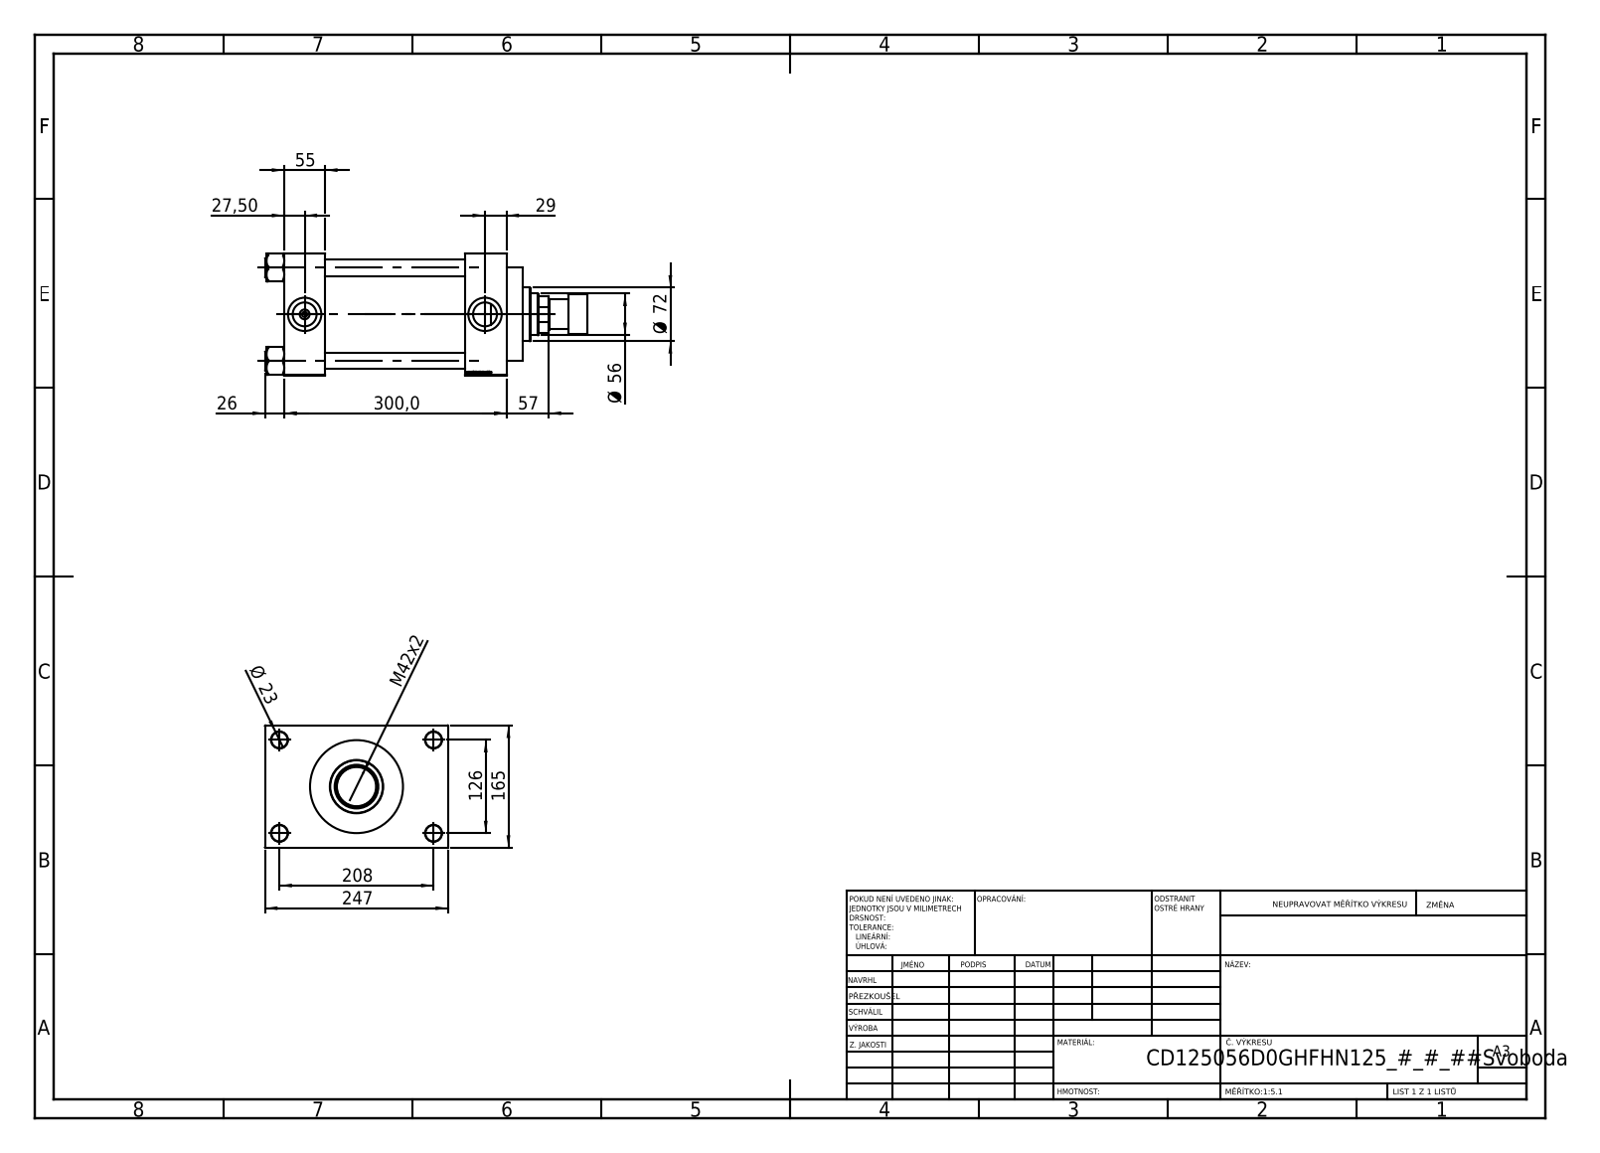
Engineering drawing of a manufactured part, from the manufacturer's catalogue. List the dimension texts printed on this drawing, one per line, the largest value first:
300,0
247
208
165
126
Ø 72
57
Ø 56
55
M42x2
29
27,50
26
Ø 23
